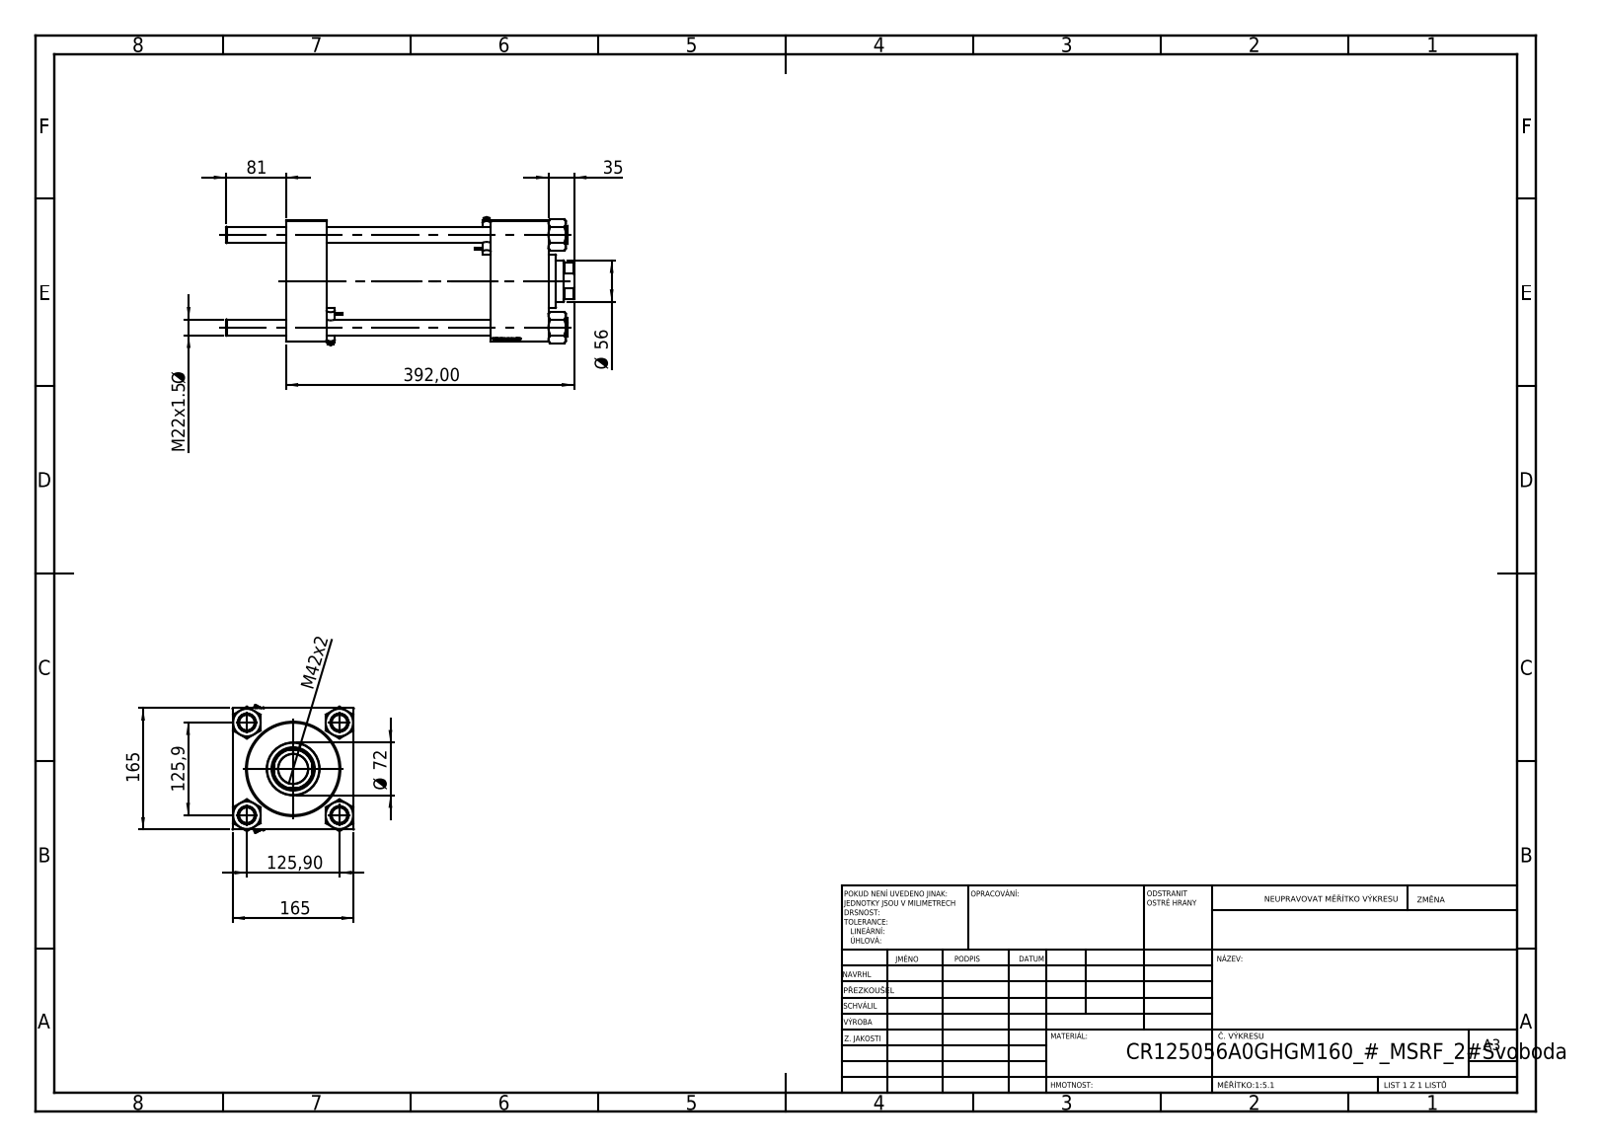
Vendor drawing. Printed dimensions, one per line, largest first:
392,00
165
165
125,9
125,90
81
Ø 72
Ø 56
M42x2
35
M22x1.5 Ø
